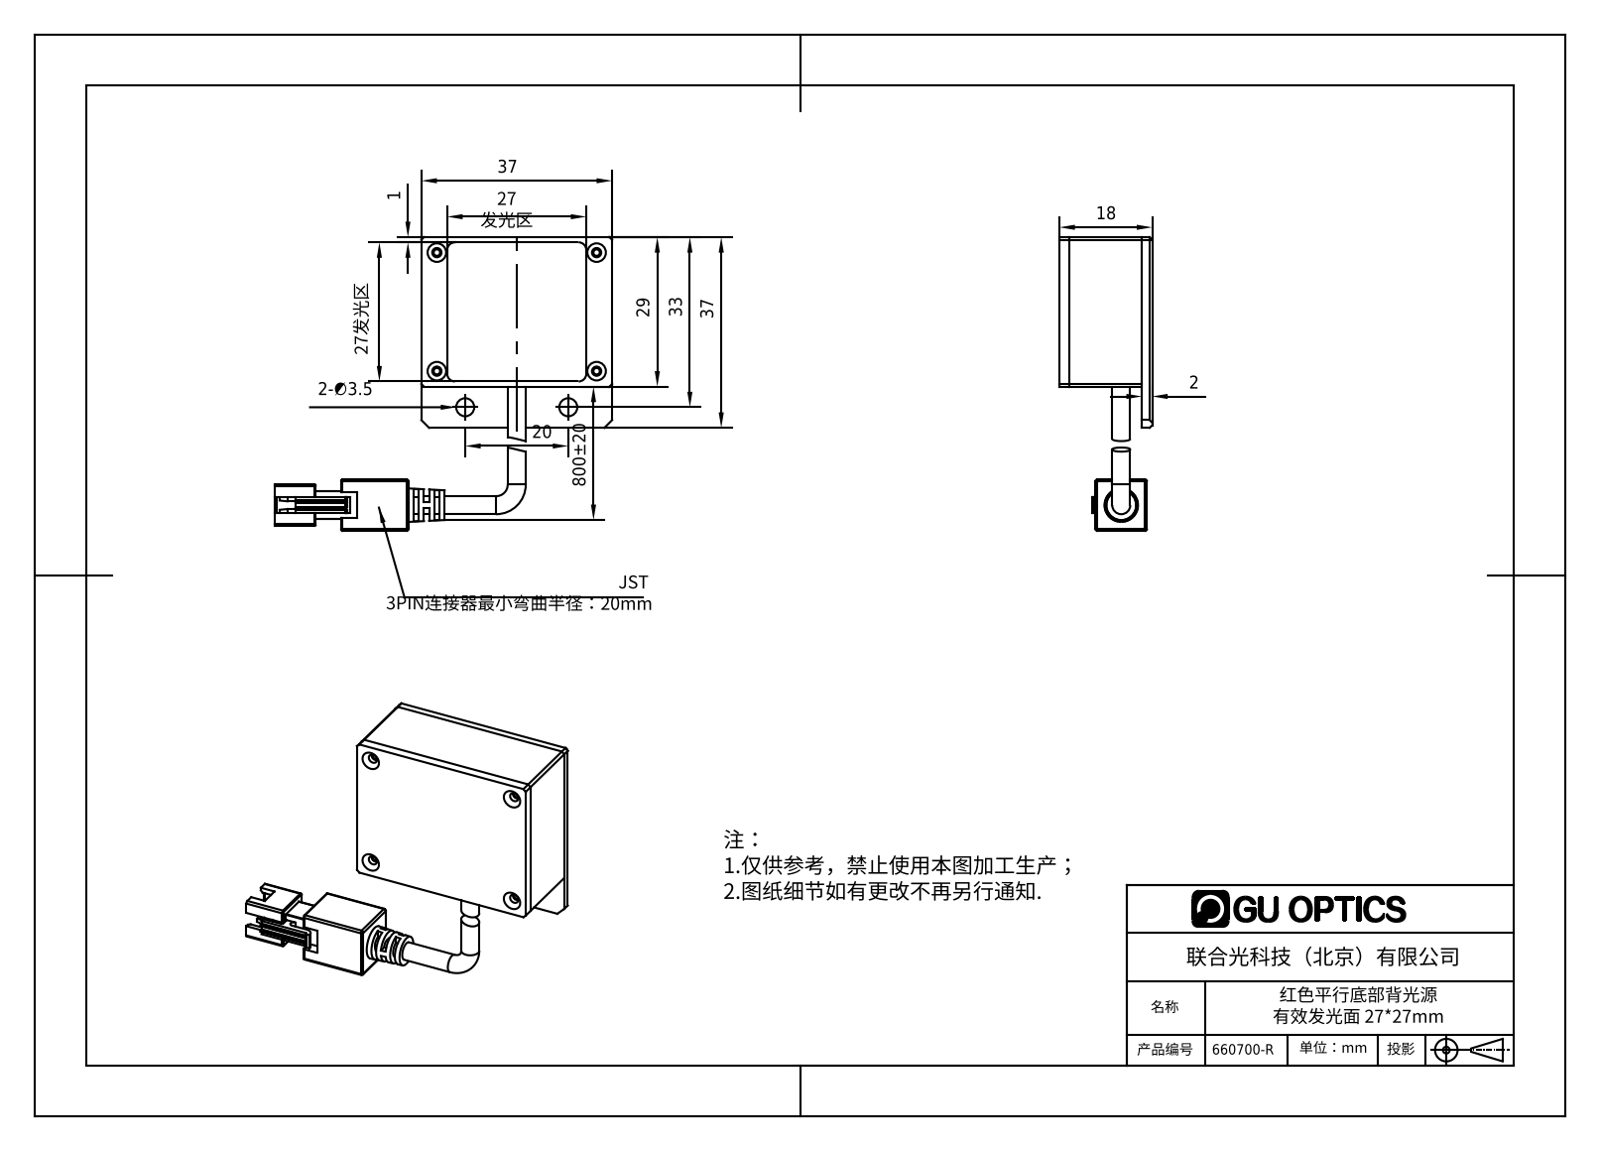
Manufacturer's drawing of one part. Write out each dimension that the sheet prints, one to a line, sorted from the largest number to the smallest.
800±20
37
37
33
29
27 发光区
27发光区
20
18
2-∅3.5
2
1
